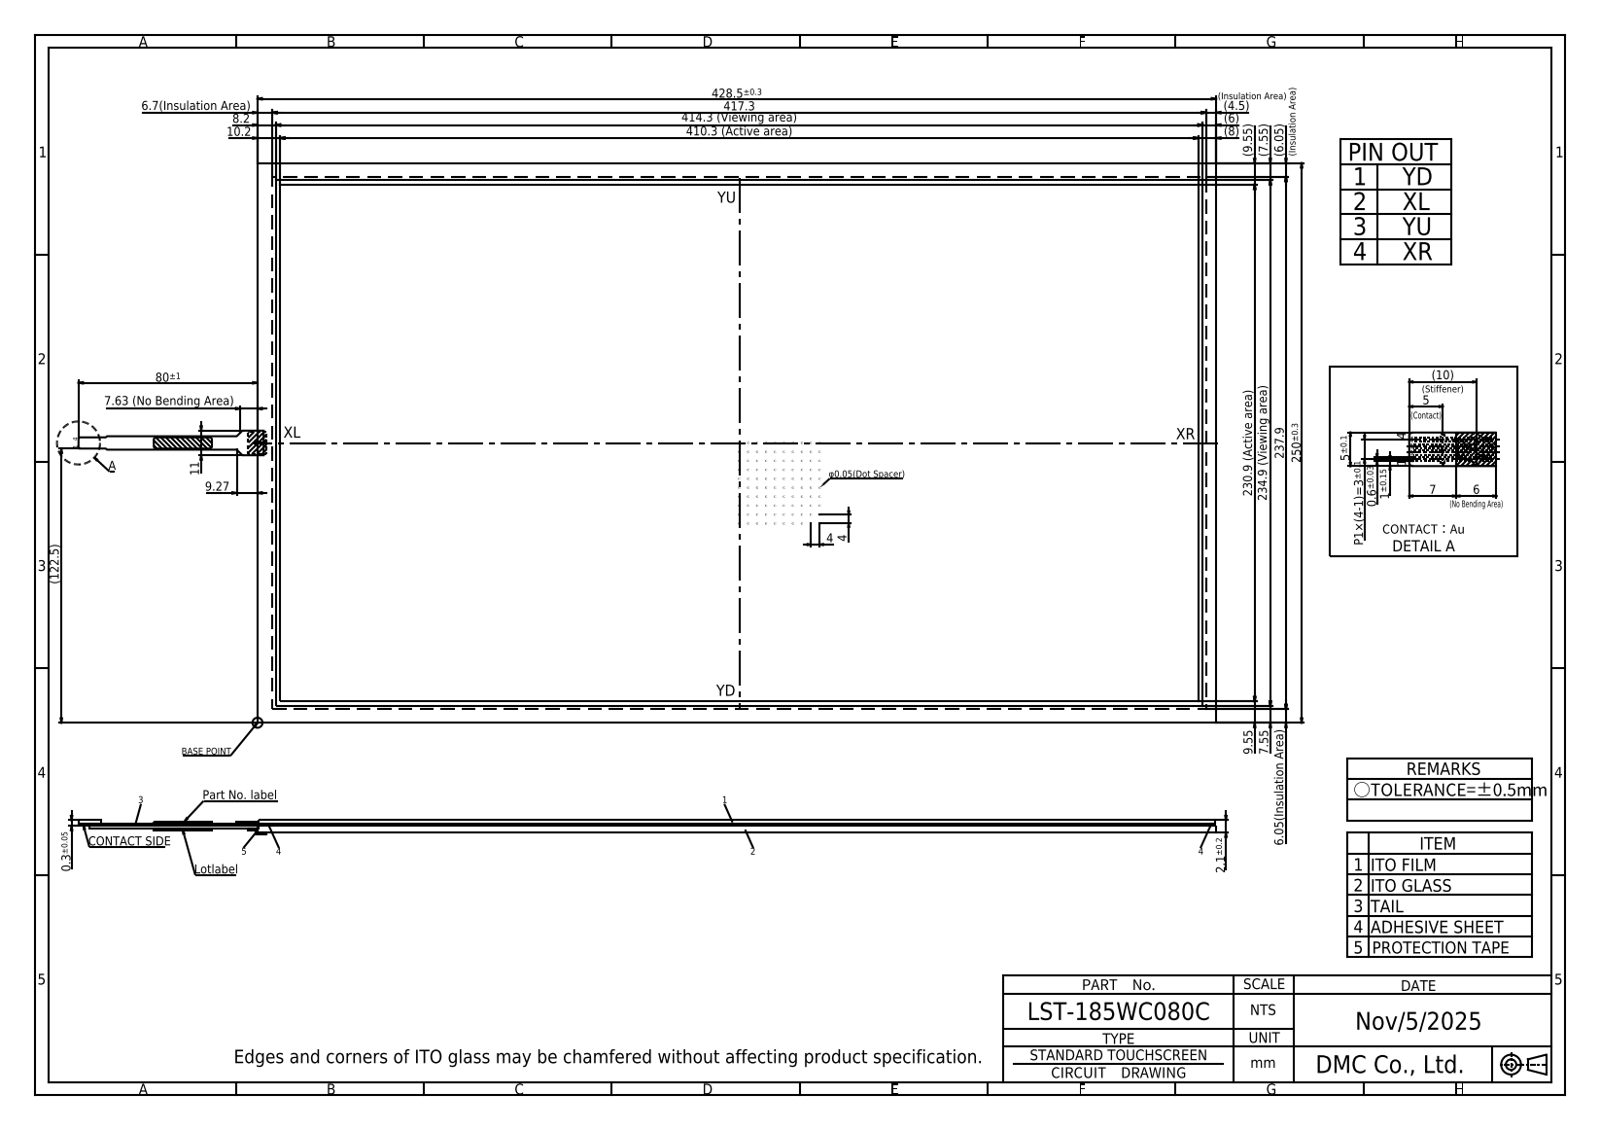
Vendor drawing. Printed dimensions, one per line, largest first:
428.5±0.3
417.3
414.3 (Viewing area)
410.3 (Active area)
250±0.3
237.9
234.9 (Viewing area)
230.9 (Active area)
(122.5)
80±1
11
10.2
(10)
9.55
(9.55)
9.27
8.2
(8)
7.63 (No Bending Area)
7.55
(7.55)
7
6.7(Insulation Area)
6.05(Insulation Area)
(6.05)
(6)
6
5
5±0.1
(4.5)
4
4
2.1±0.2
P1×(4-1)=3±0.1
1±0.15
0.6±0.03
0.3±0.05
